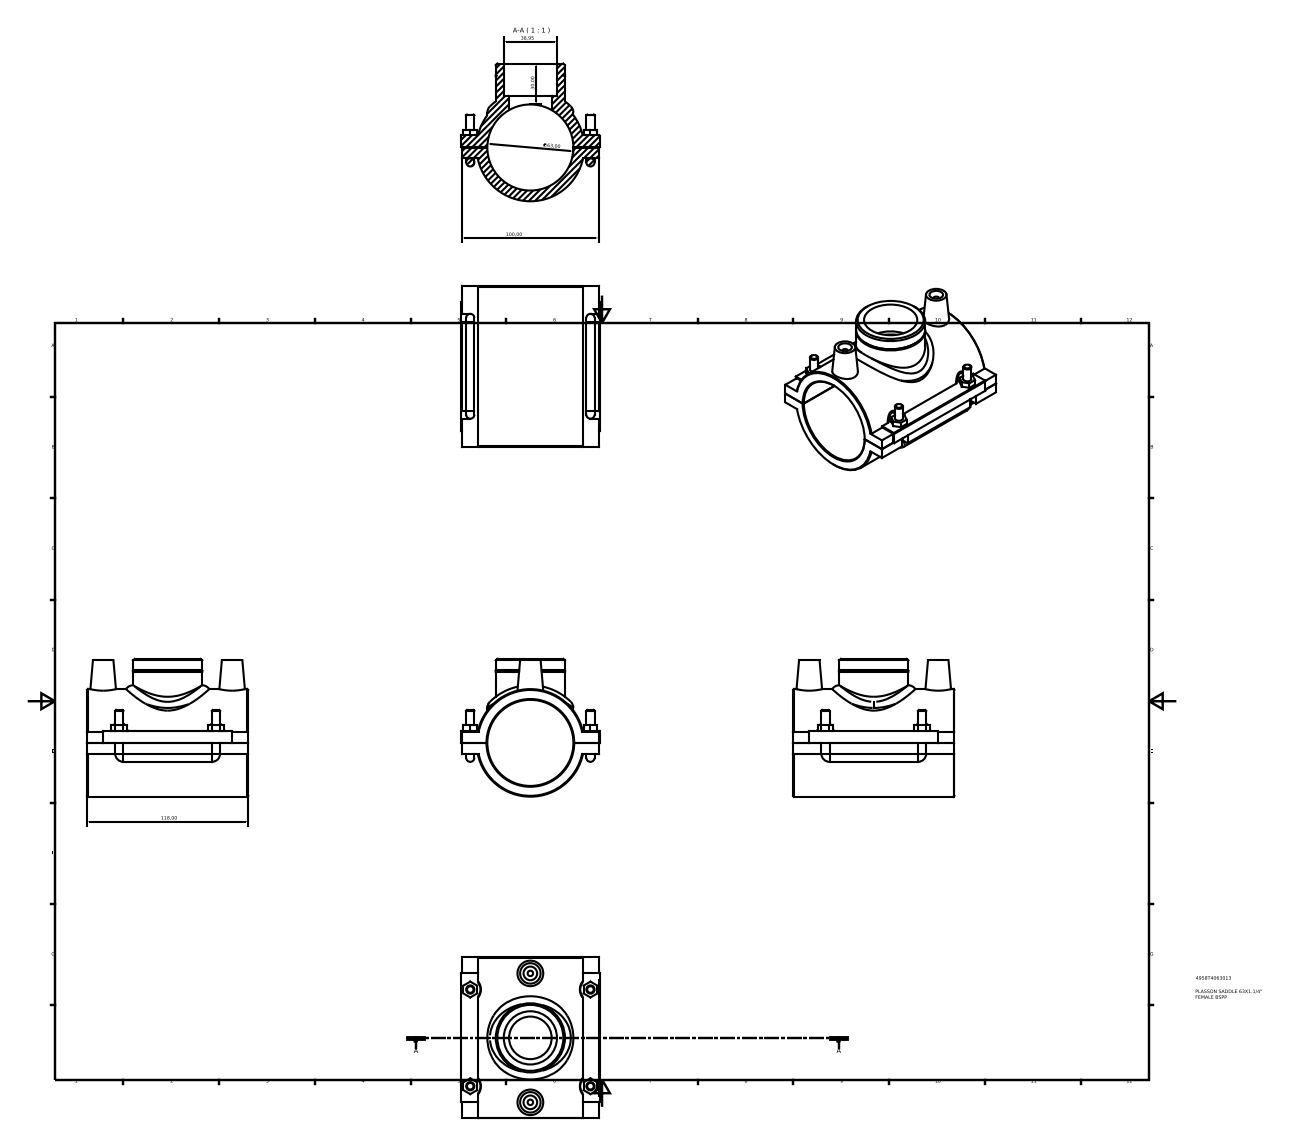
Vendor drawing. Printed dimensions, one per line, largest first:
118,00
100,00
∅63,00
38,95
30,00
